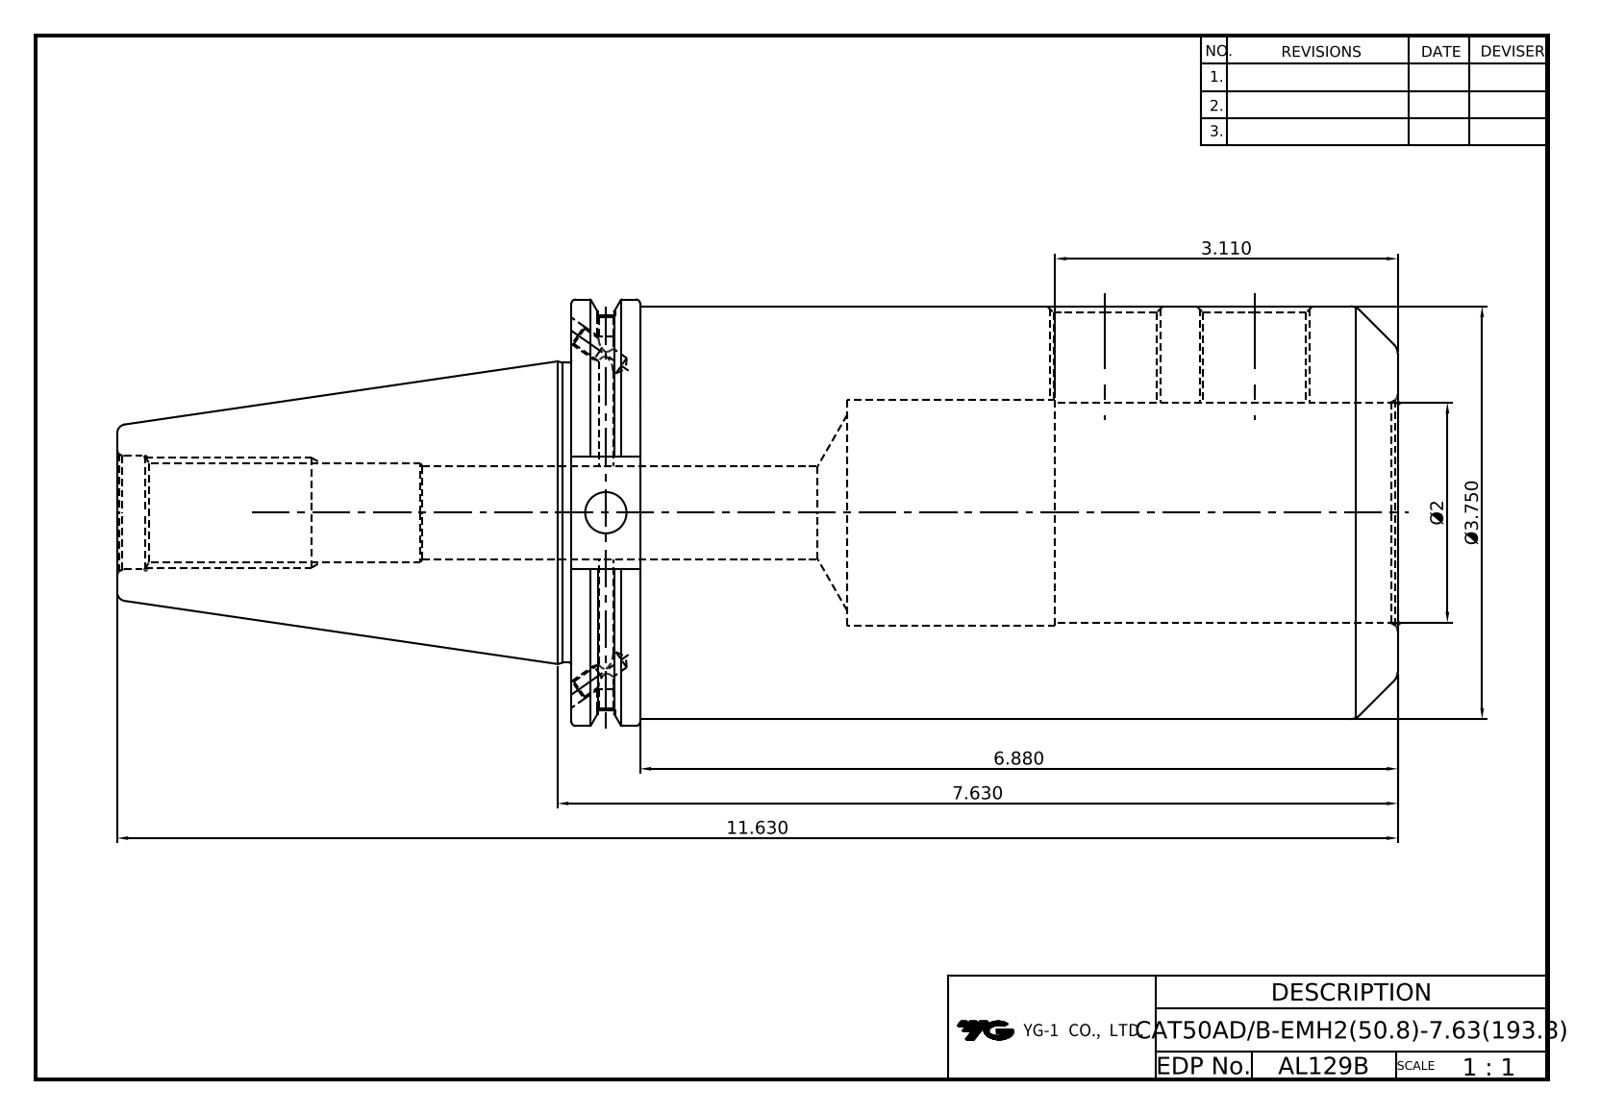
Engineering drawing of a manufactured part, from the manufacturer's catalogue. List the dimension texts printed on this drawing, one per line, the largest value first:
11.630
7.630
6.880
Ø3.750
3.110
Ø2
